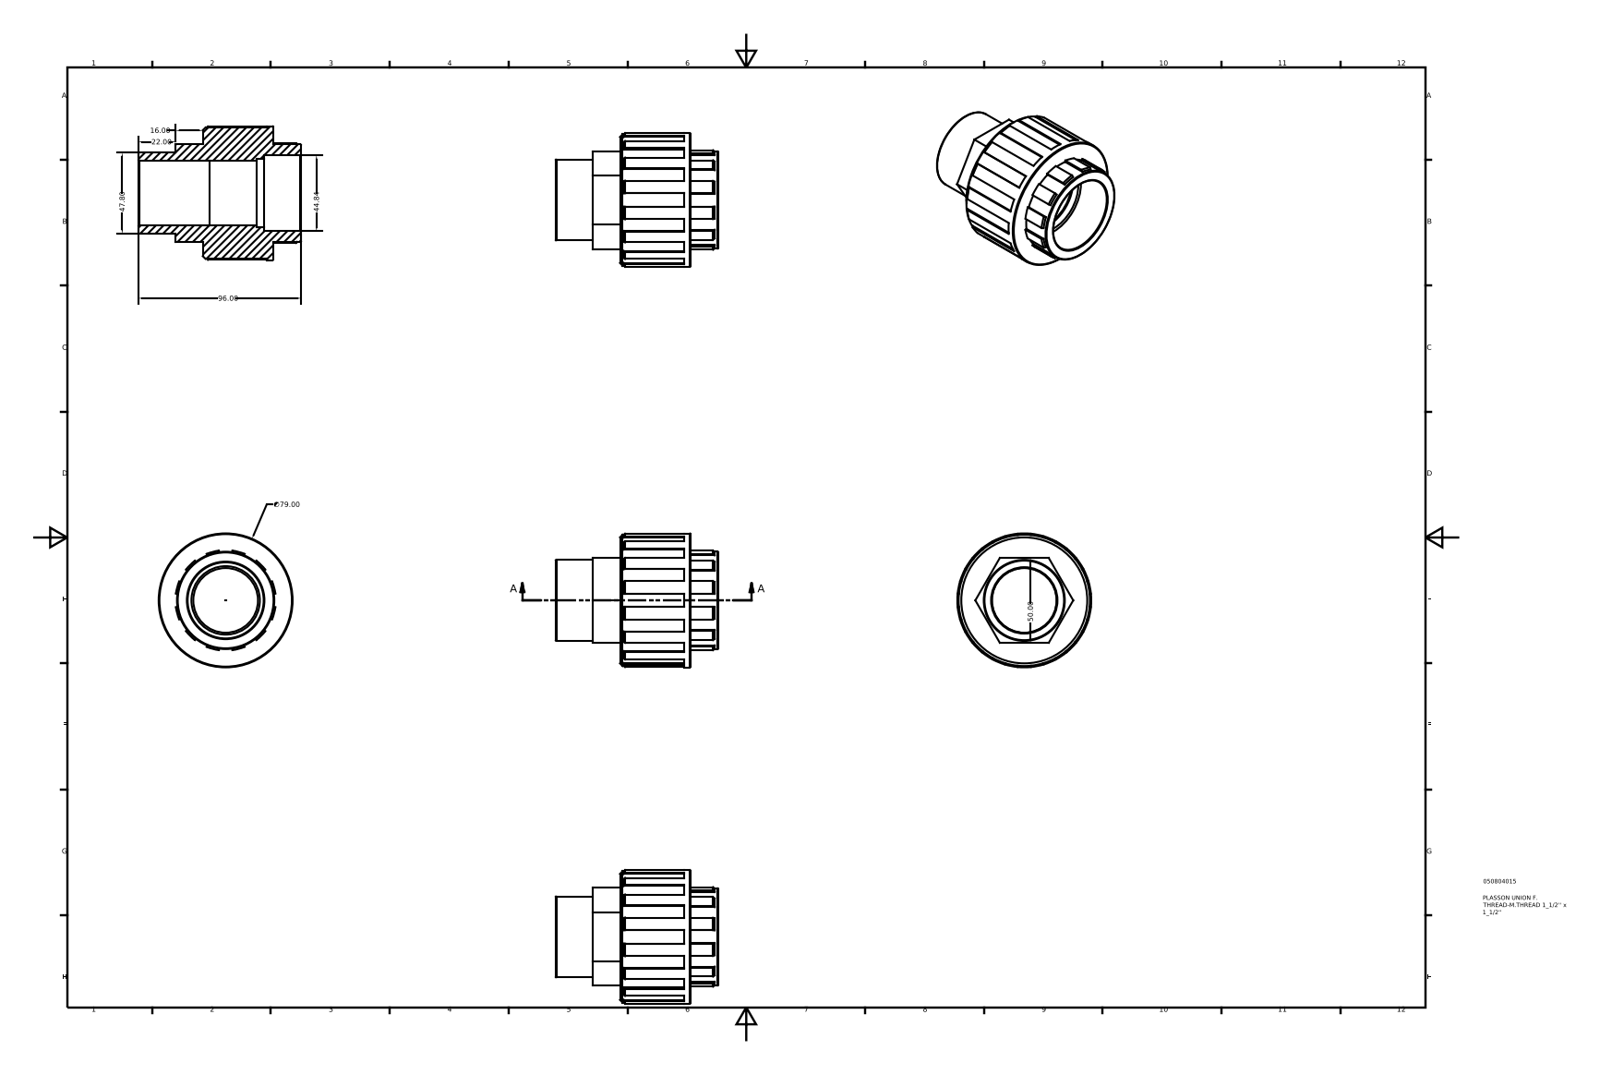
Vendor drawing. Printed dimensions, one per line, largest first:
96.00
∅79.00
50.00
47.80
44.84
22.00
16.00
